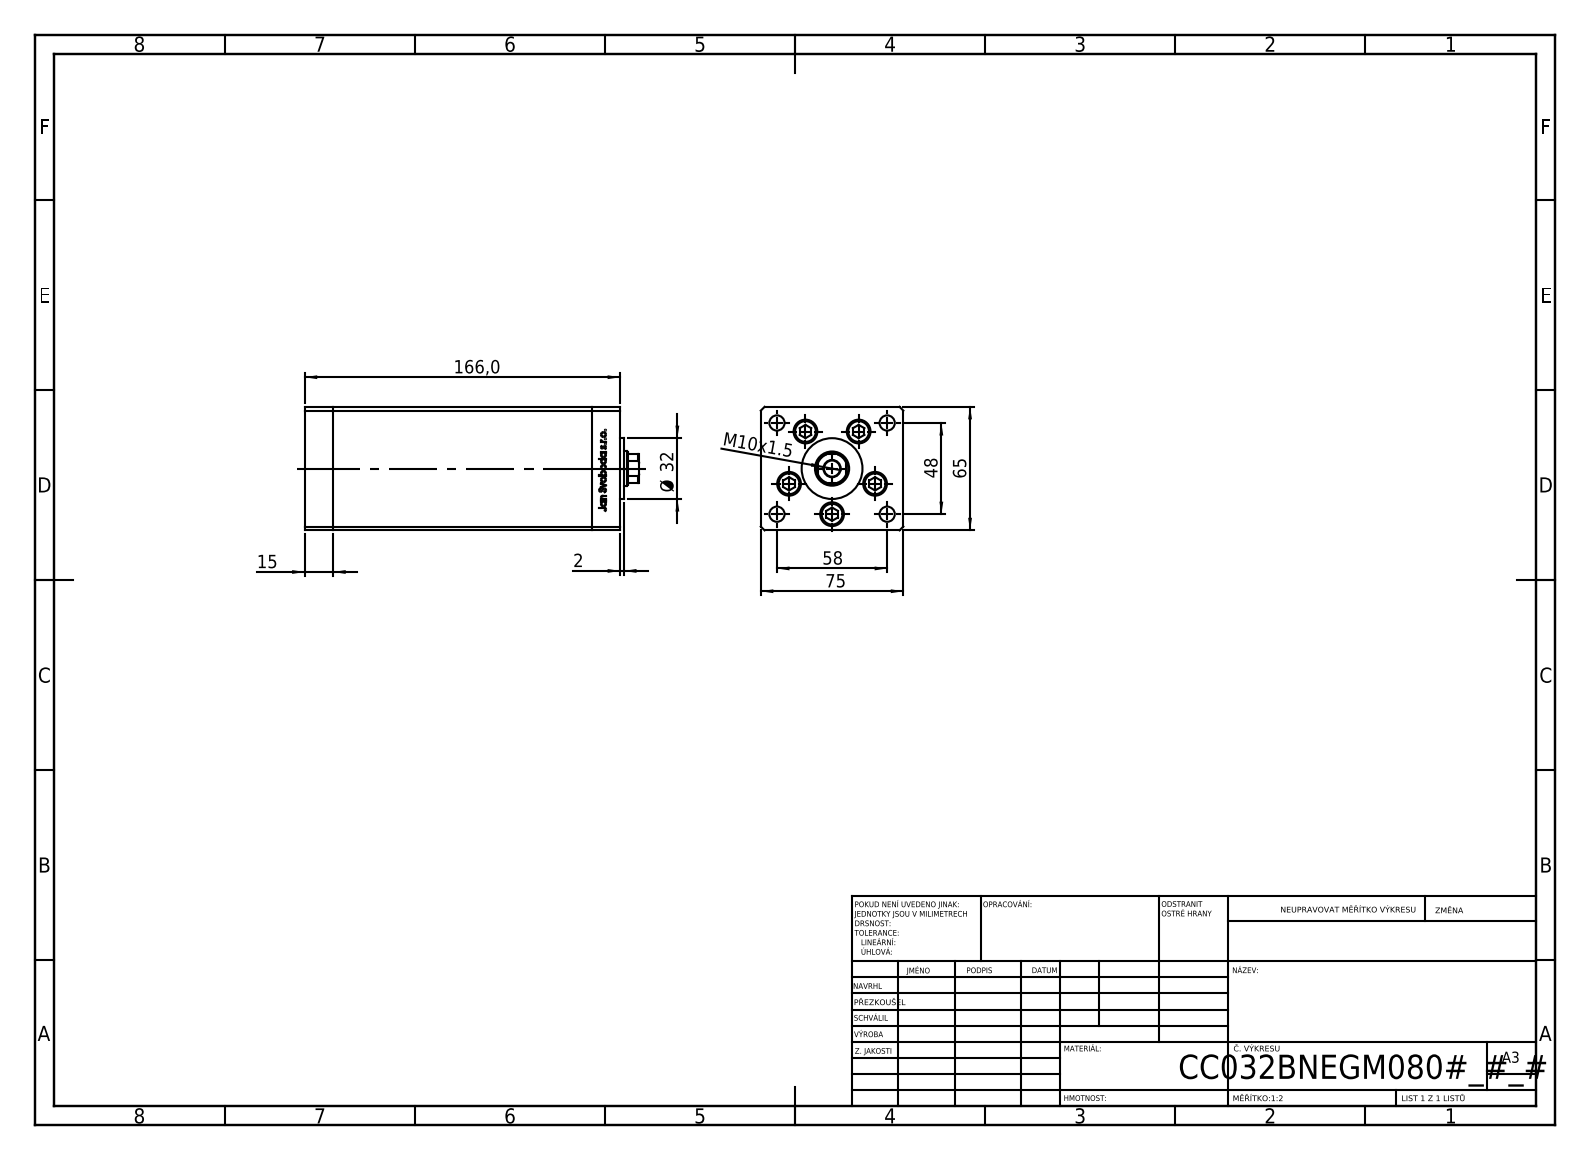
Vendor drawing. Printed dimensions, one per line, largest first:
166,0
75
65
58
48
Ø 32
15
M10x1.5
2
